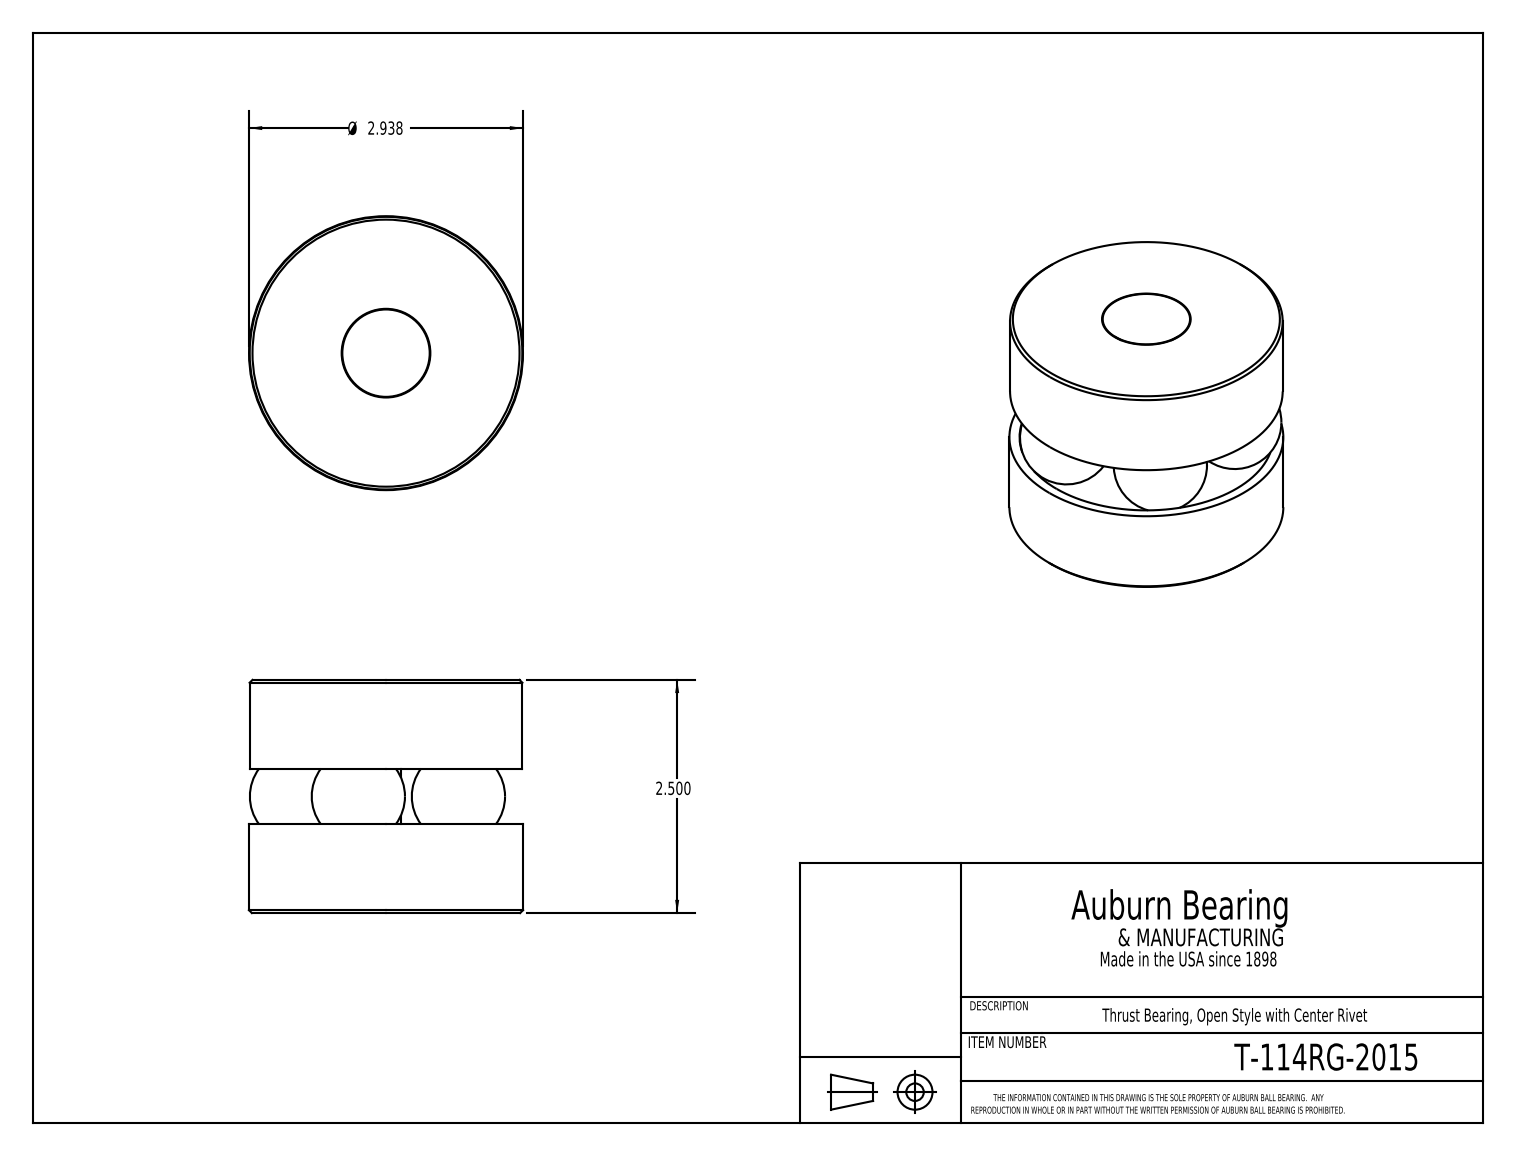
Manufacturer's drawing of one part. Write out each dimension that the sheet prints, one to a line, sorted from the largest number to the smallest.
Ø 2.938
2.500
